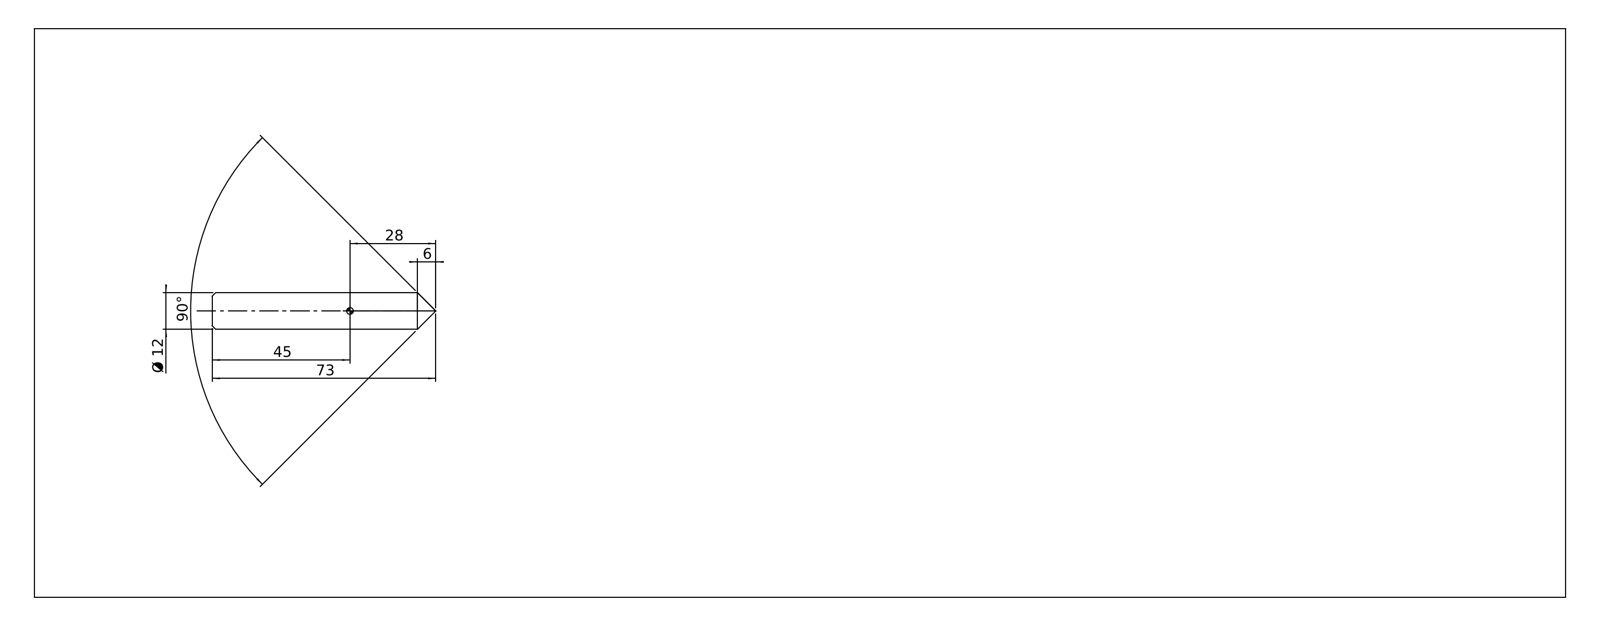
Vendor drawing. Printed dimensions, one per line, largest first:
90°
73
45
28
Ø 12
6
